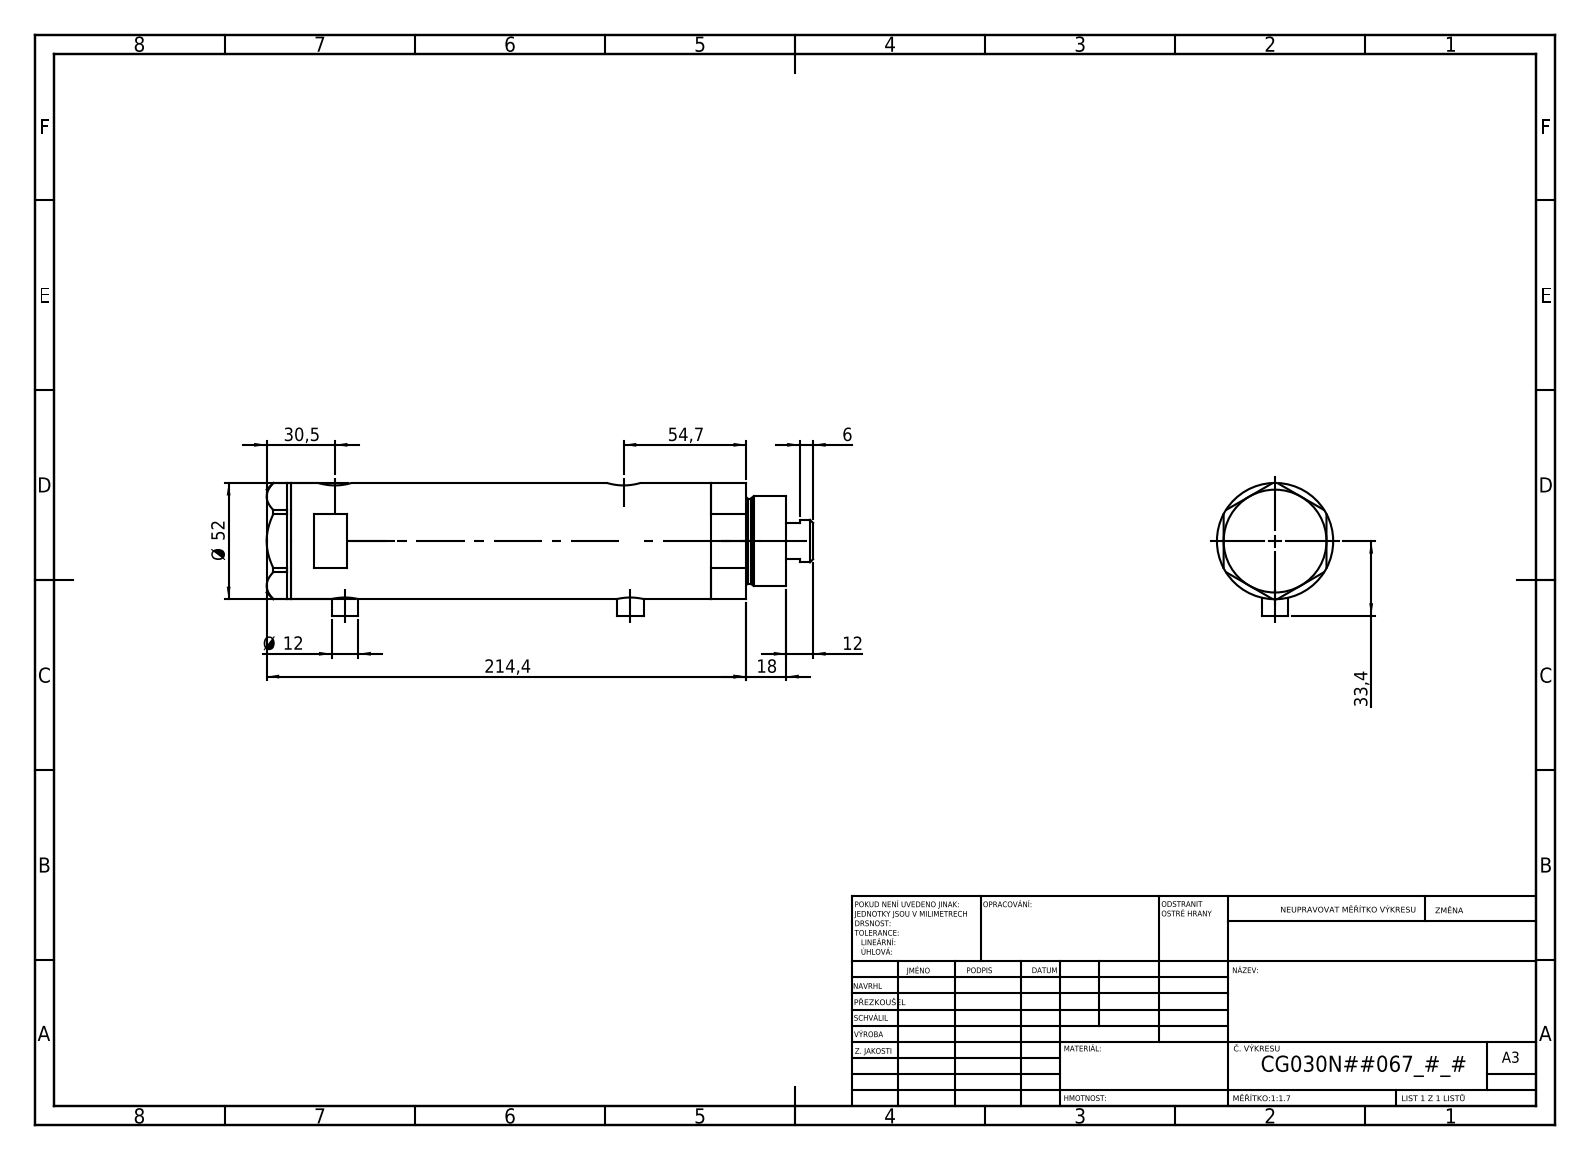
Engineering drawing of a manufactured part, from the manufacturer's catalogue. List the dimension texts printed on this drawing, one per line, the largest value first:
214,4
54,7
Ø 52
33,4
30,5
18
12
Ø 12
6
